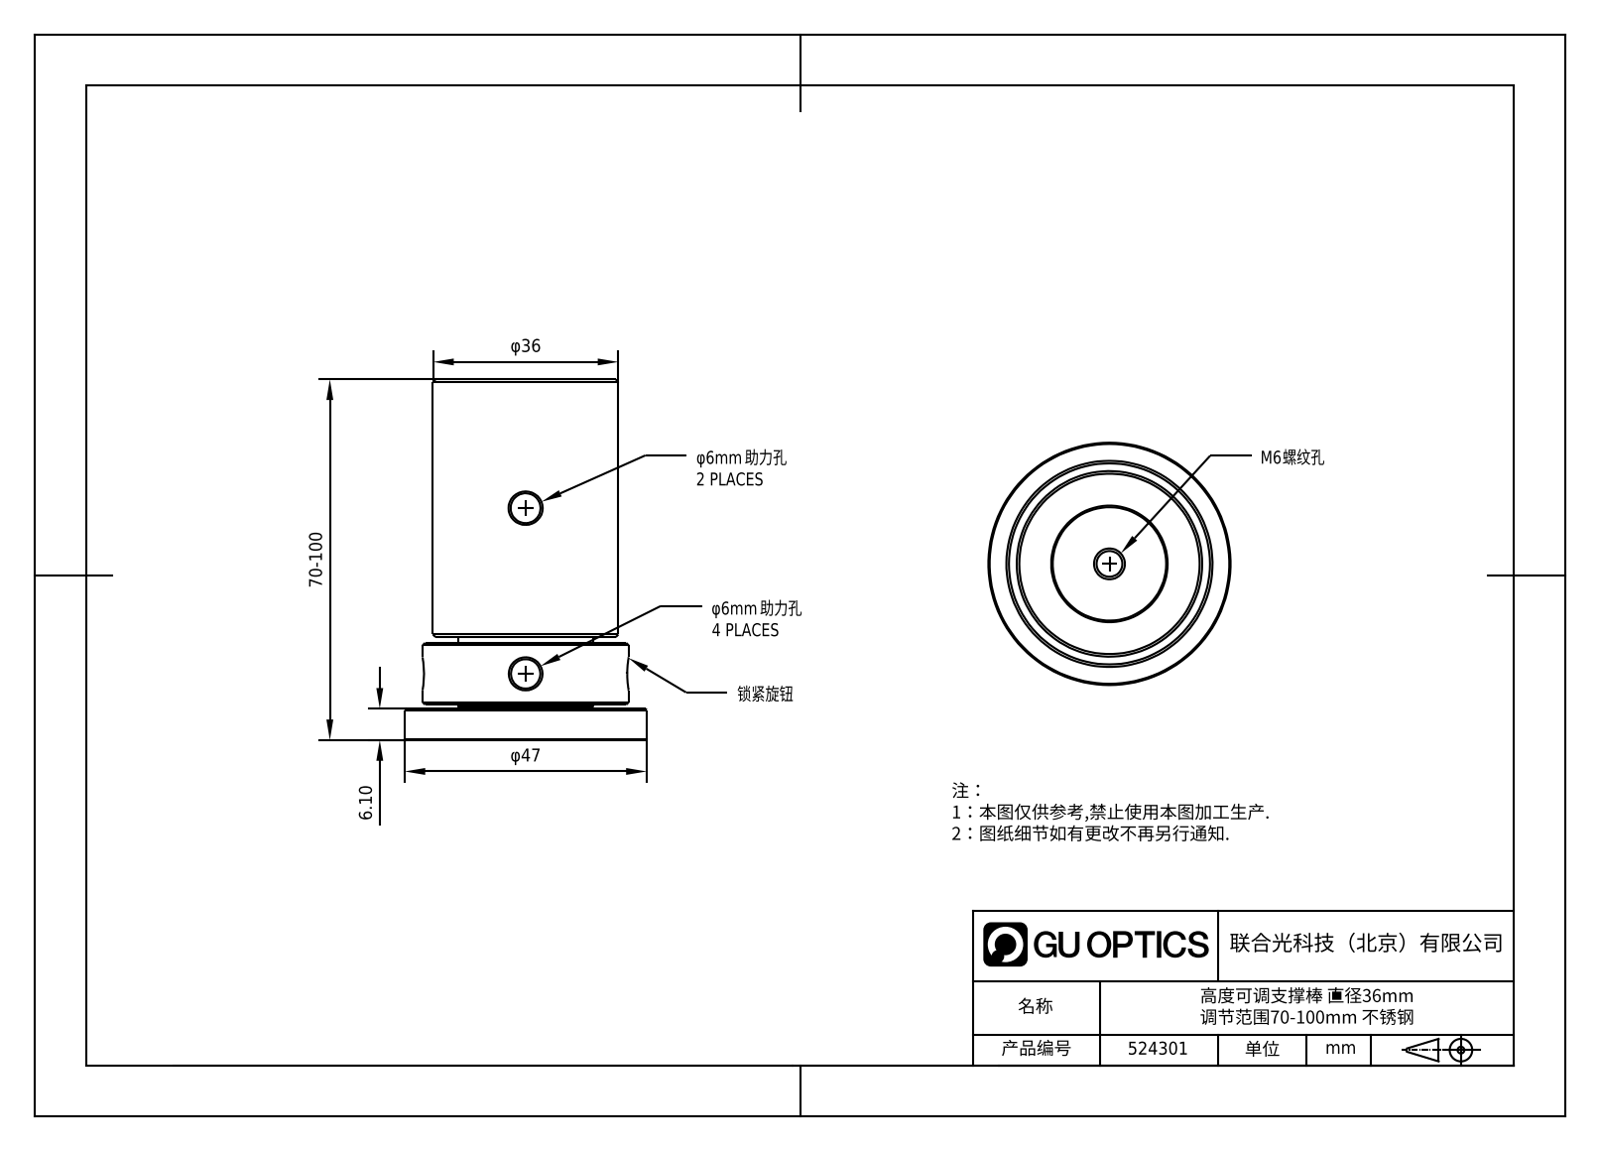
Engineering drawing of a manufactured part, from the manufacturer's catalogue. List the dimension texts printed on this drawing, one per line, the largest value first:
70-100
φ47
φ36
6.10
